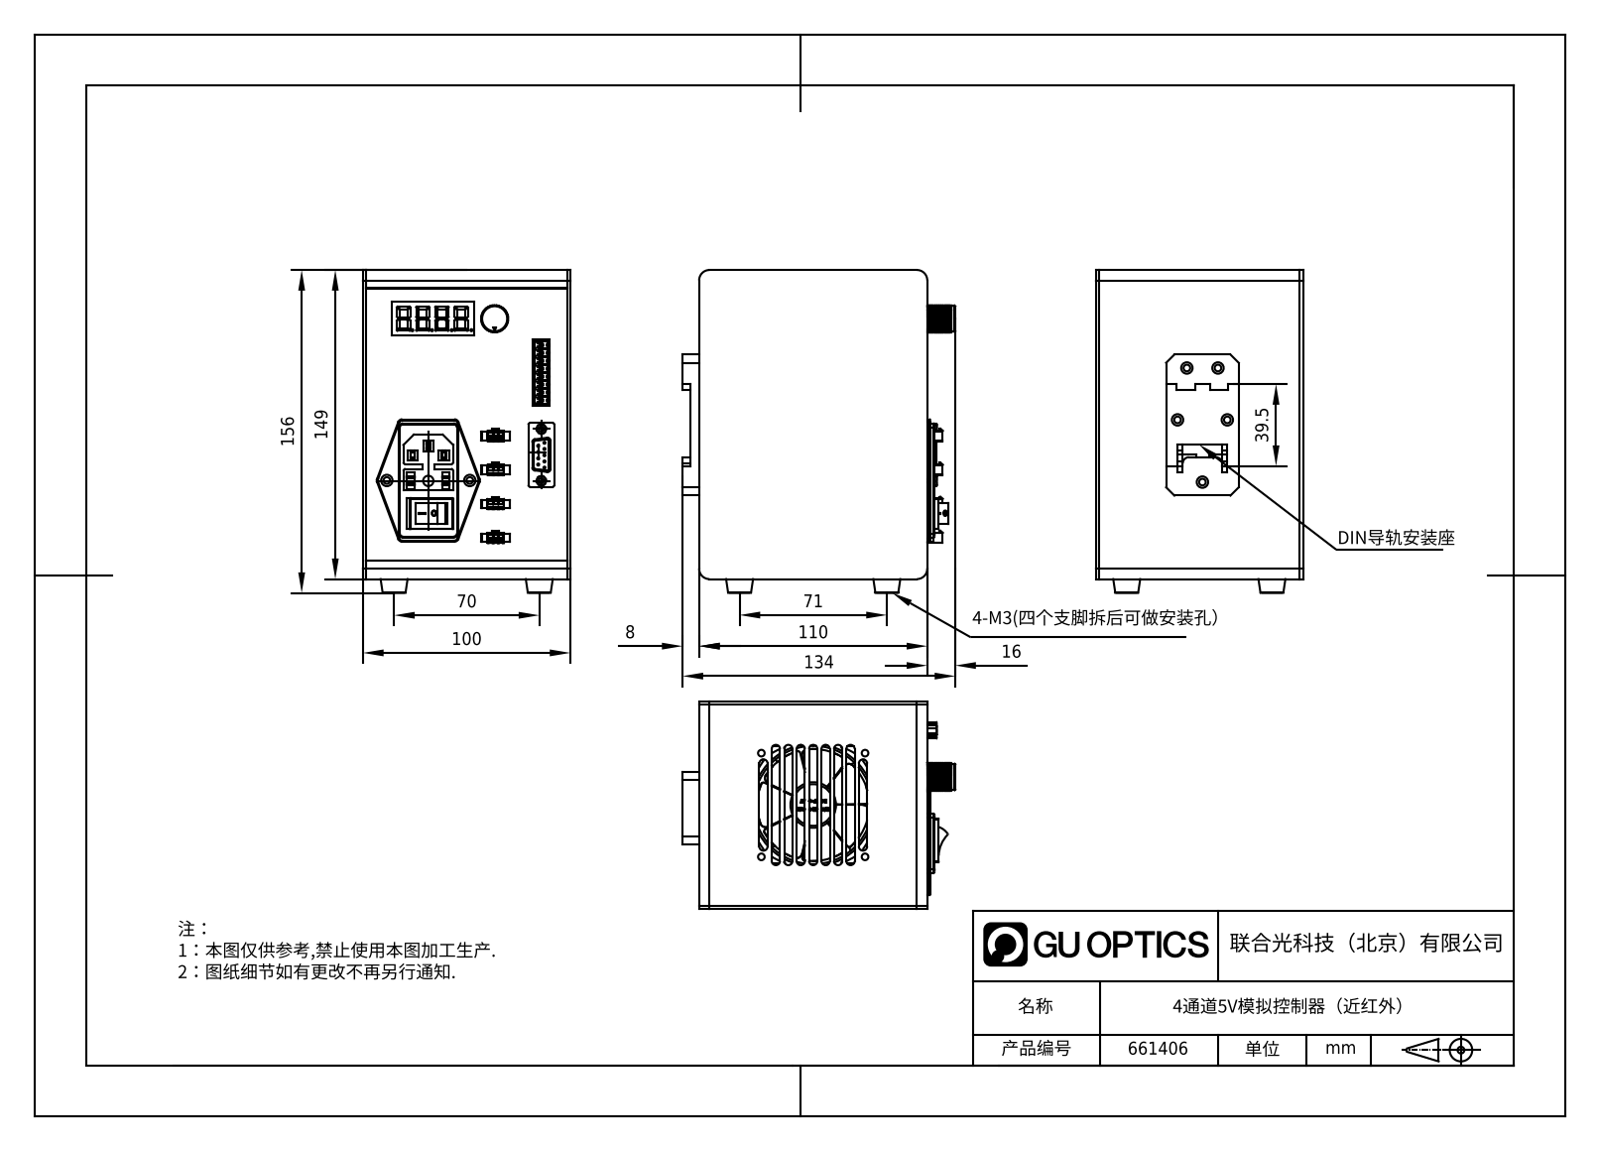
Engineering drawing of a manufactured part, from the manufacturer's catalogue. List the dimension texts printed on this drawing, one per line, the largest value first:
156
149
134
110
100
71
70
39.5
16
8
